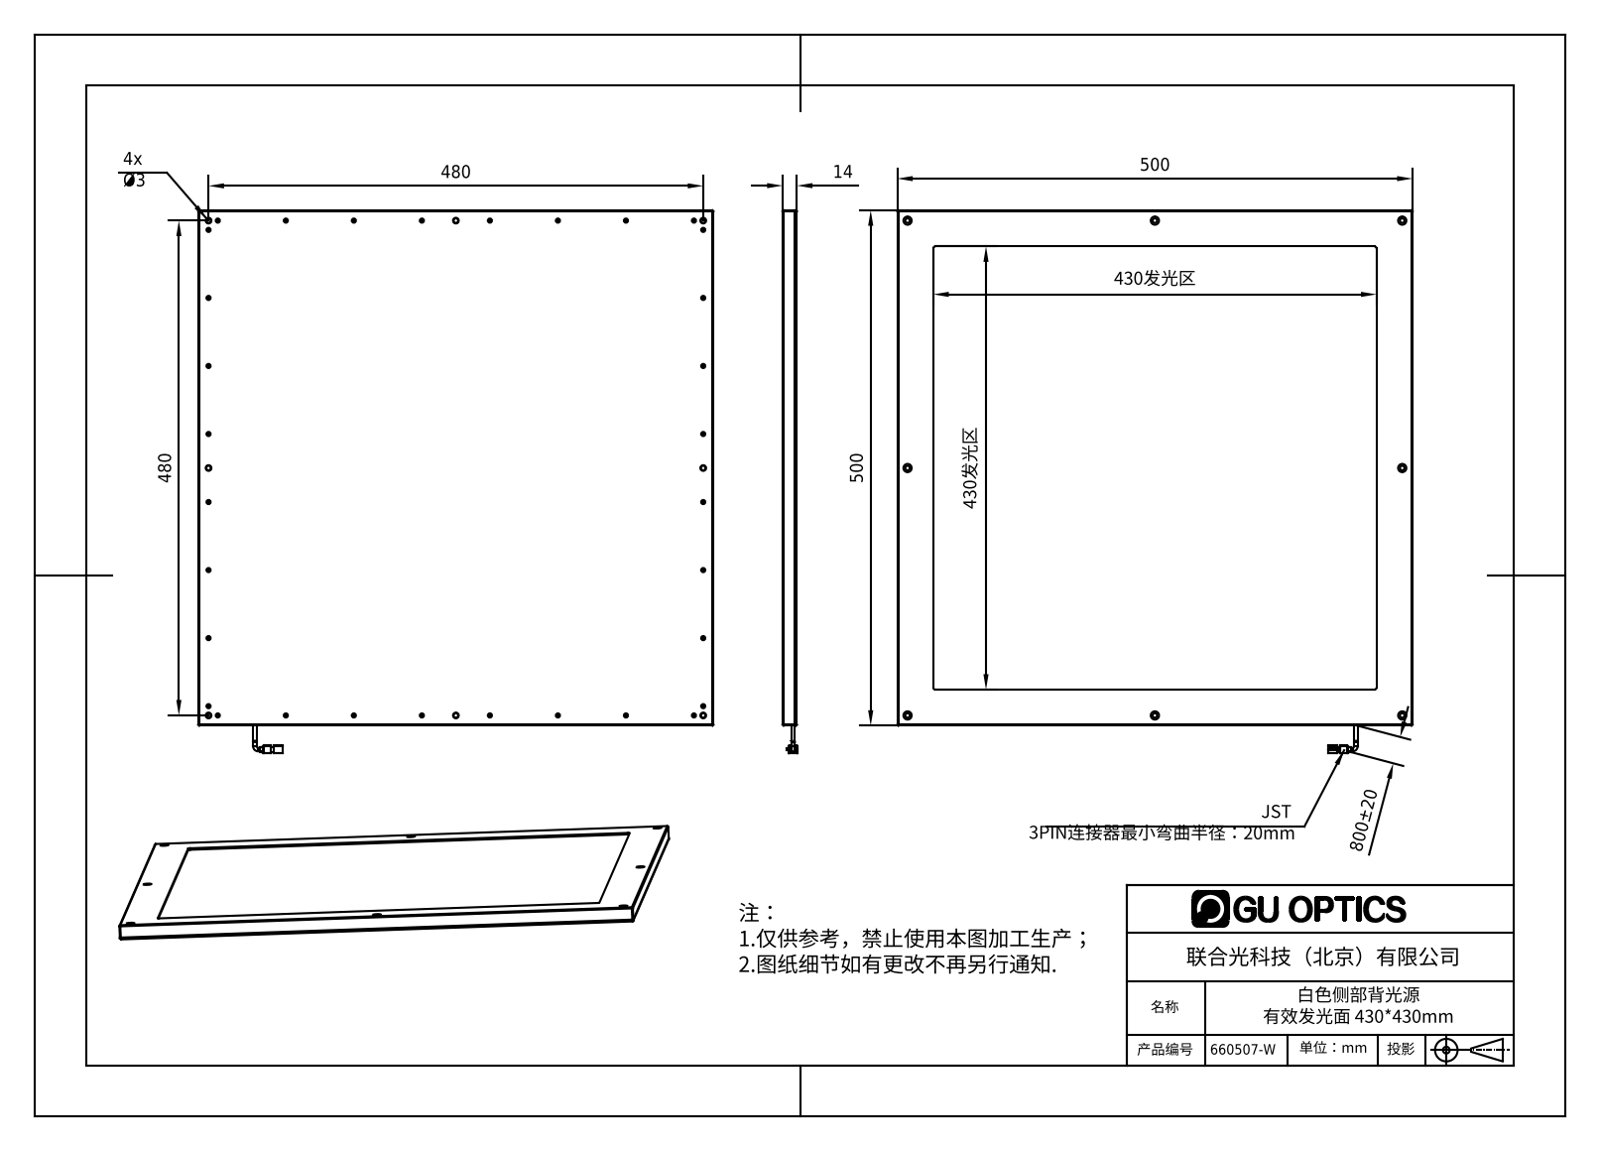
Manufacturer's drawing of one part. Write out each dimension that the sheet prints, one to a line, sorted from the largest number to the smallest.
800±20
500
500
480
480
430发光区
430发光区
14
